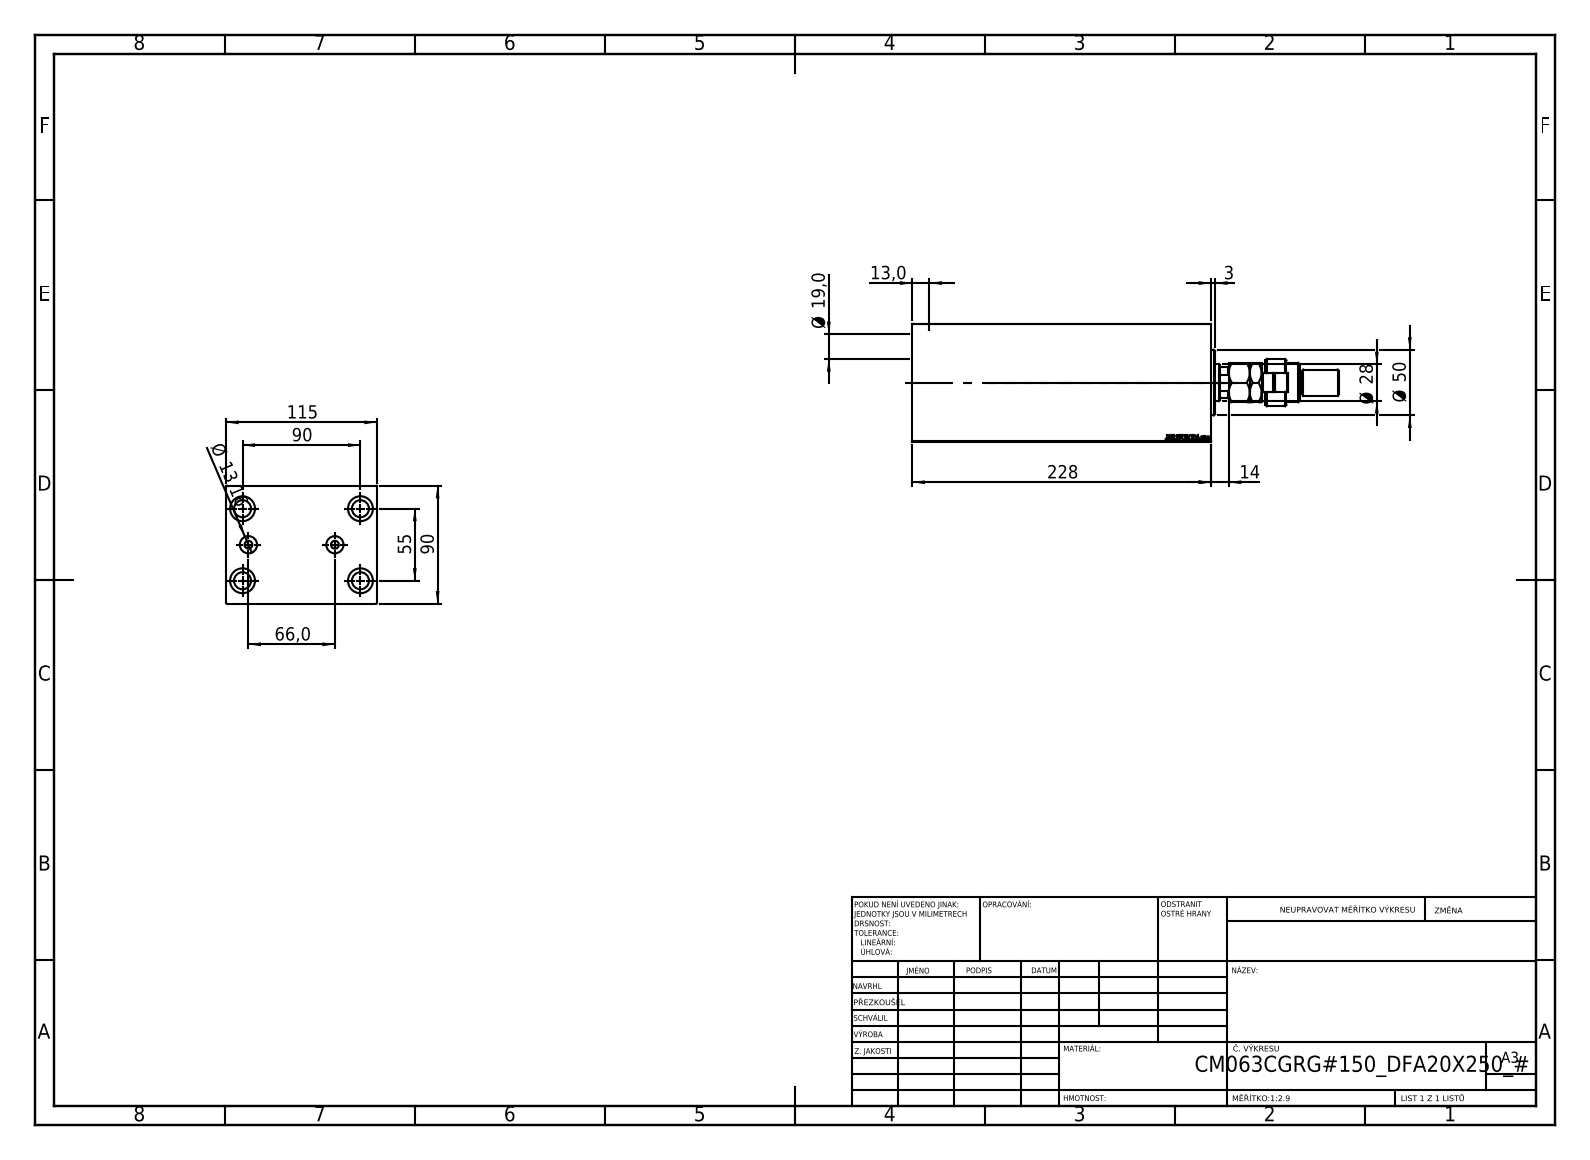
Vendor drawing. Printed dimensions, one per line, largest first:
228
115
90
90
66,0
55
Ø 50
Ø 28
Ø 19,0
14
Ø 13,16
13,0
3
